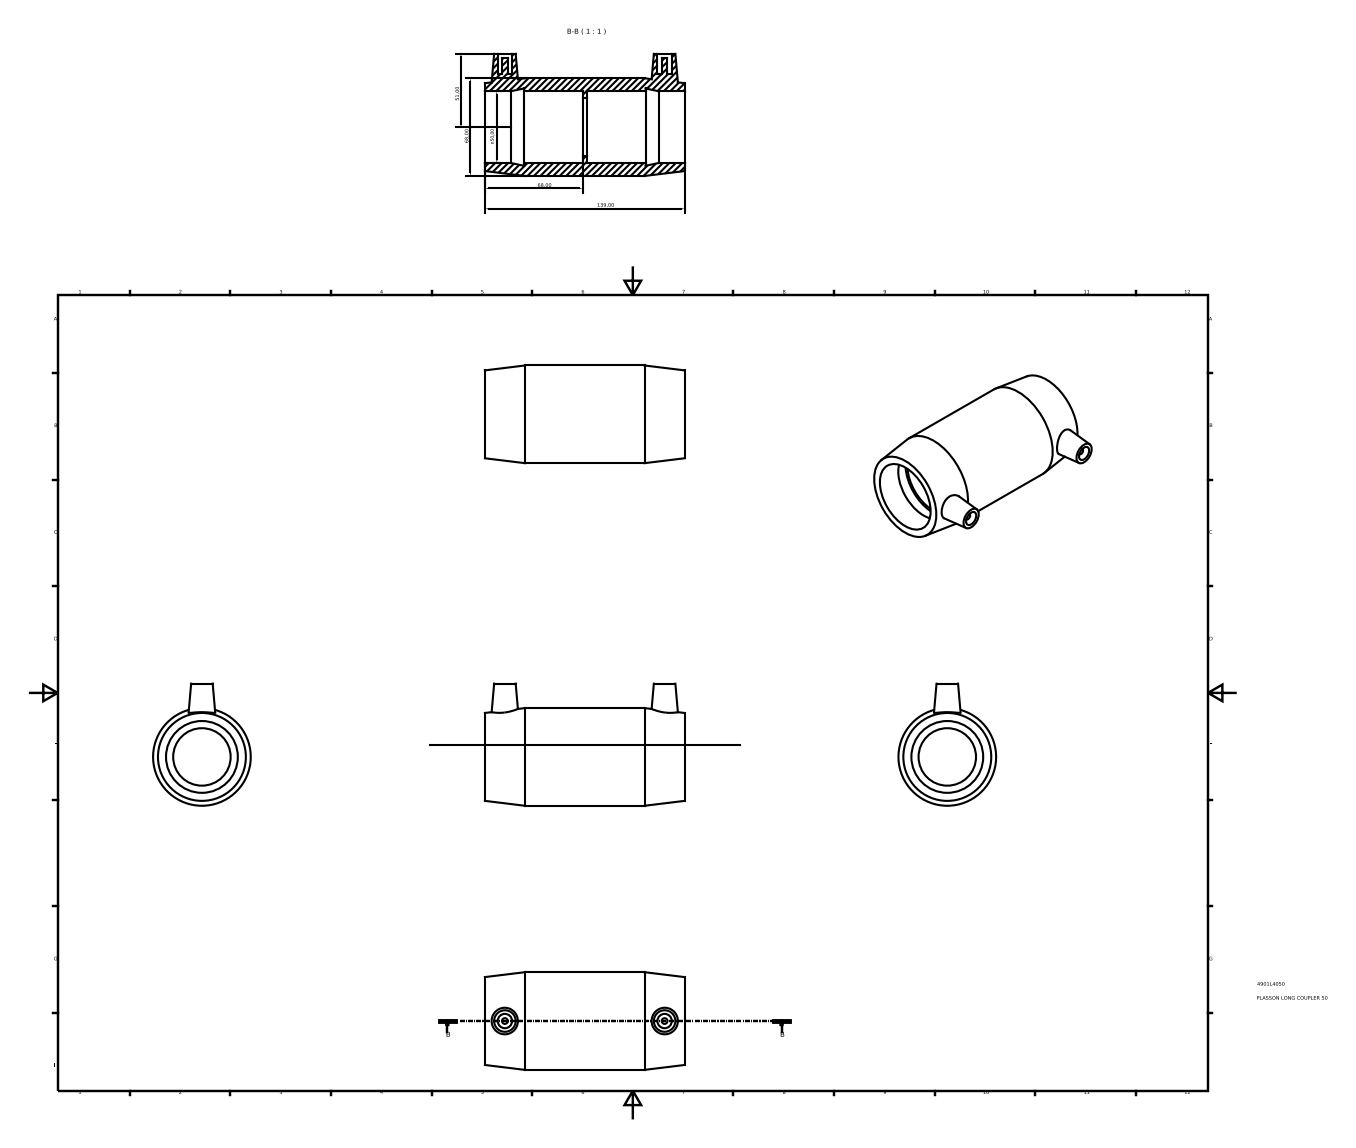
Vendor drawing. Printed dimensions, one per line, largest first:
139,00
68,00
68,00
51,00
n50,00
